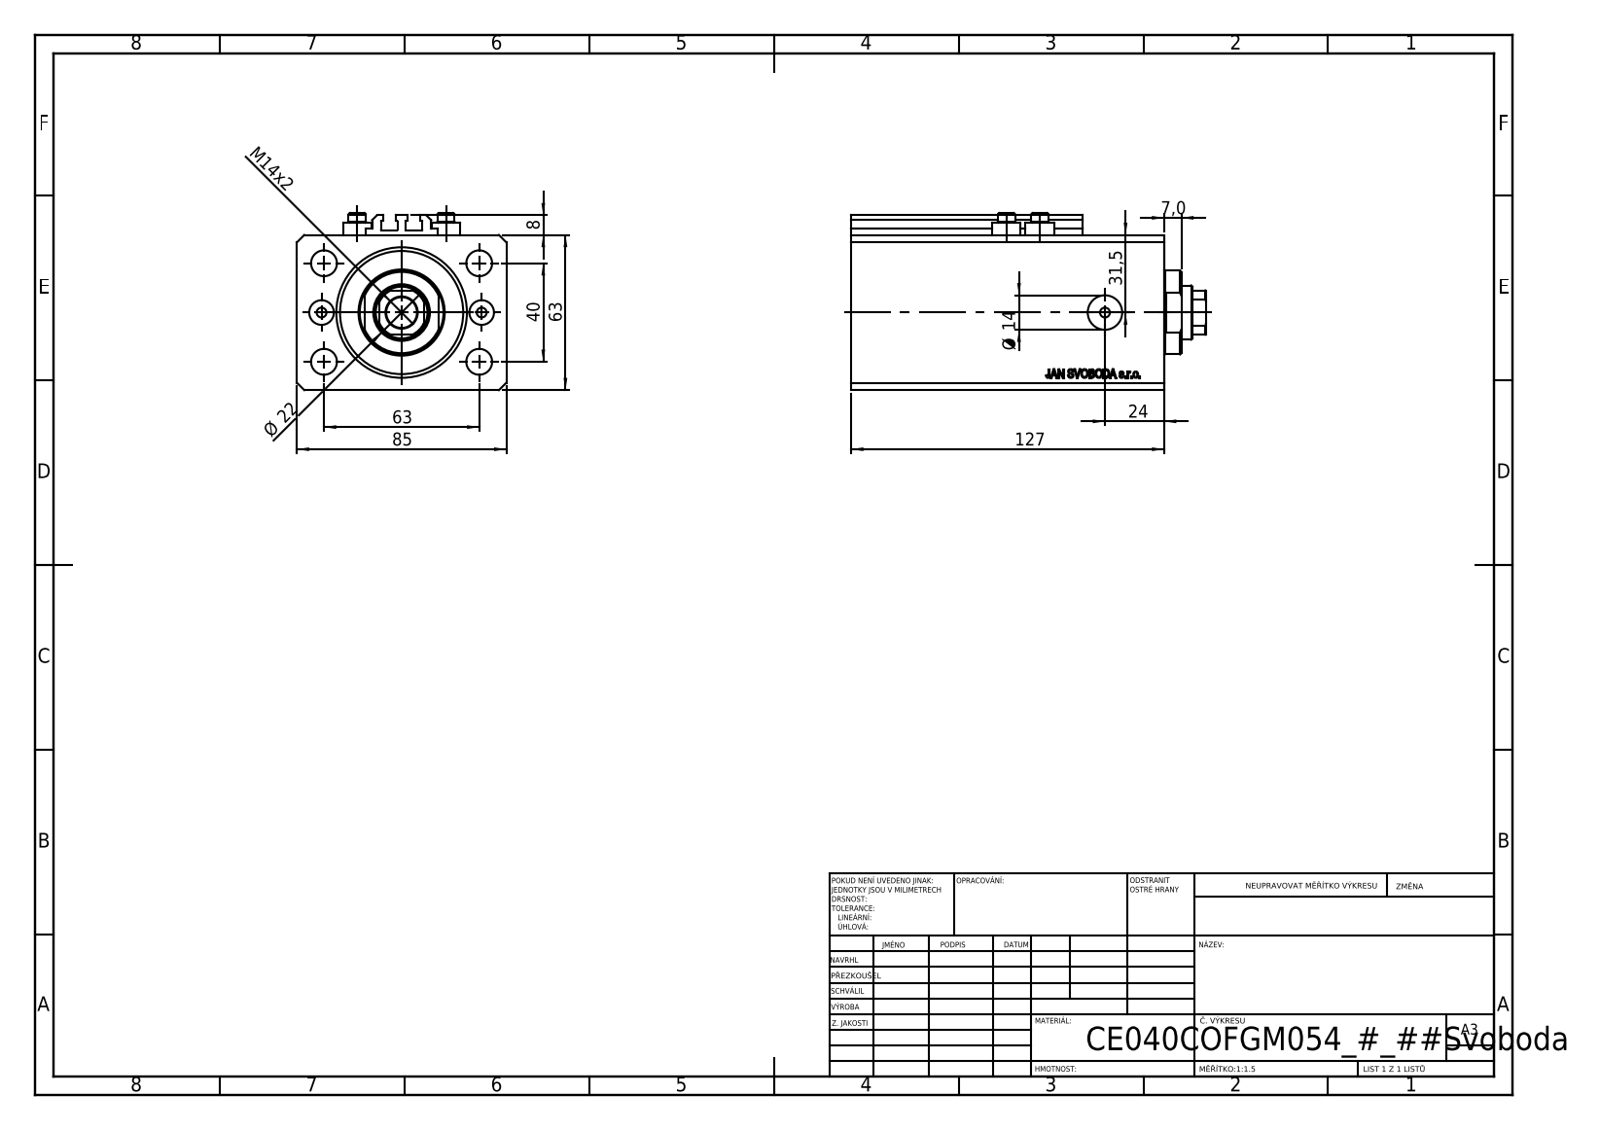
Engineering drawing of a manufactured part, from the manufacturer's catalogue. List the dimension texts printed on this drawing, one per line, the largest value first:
127
85
63
63
40
31,5
24
Ø 22
M14x2
Ø 14
8
7,0
